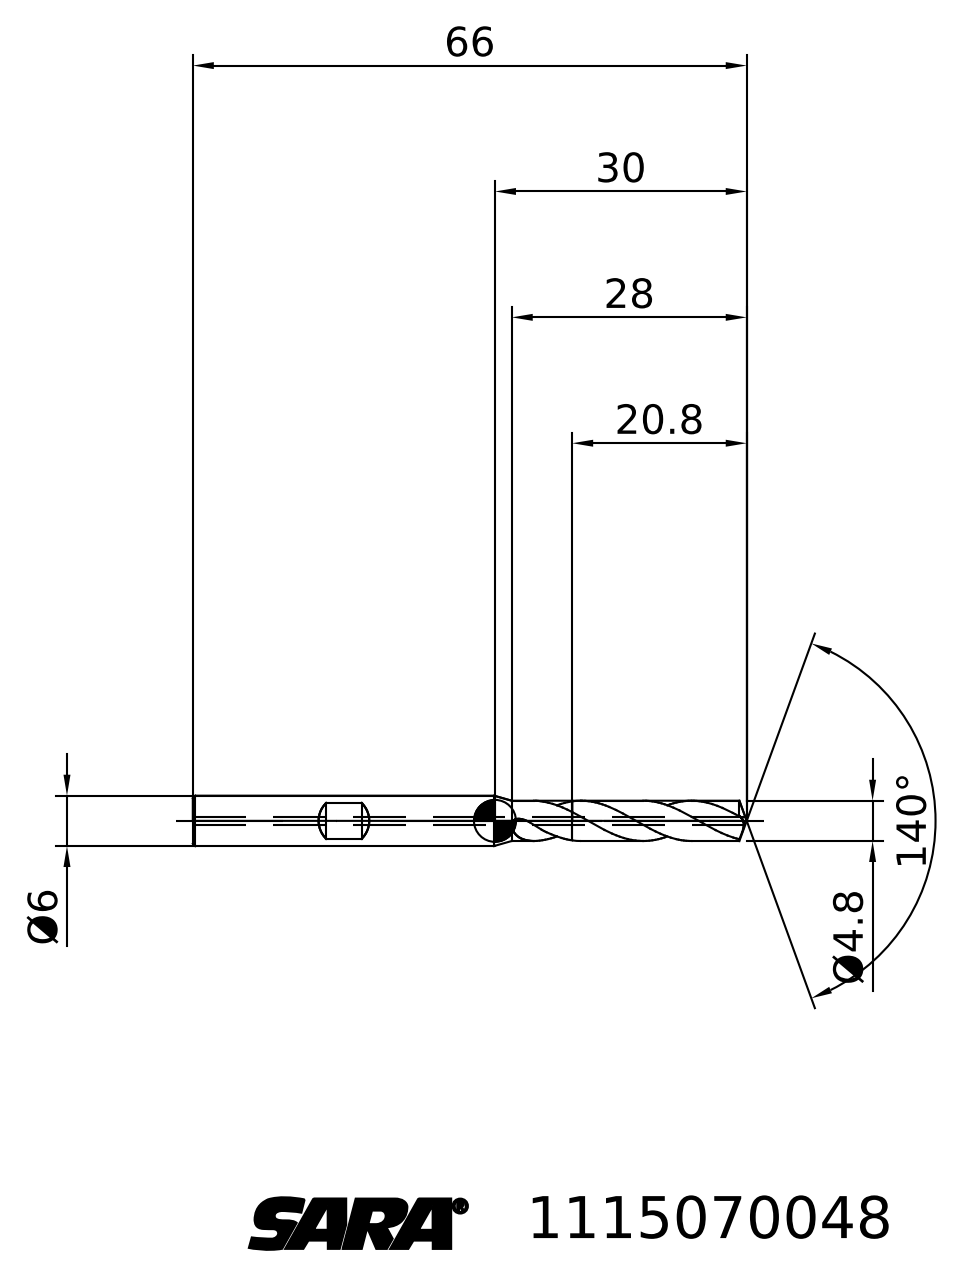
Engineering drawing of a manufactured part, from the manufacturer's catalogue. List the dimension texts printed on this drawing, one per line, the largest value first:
140°
66
30
28
20.8
Ø6
Ø4.8
